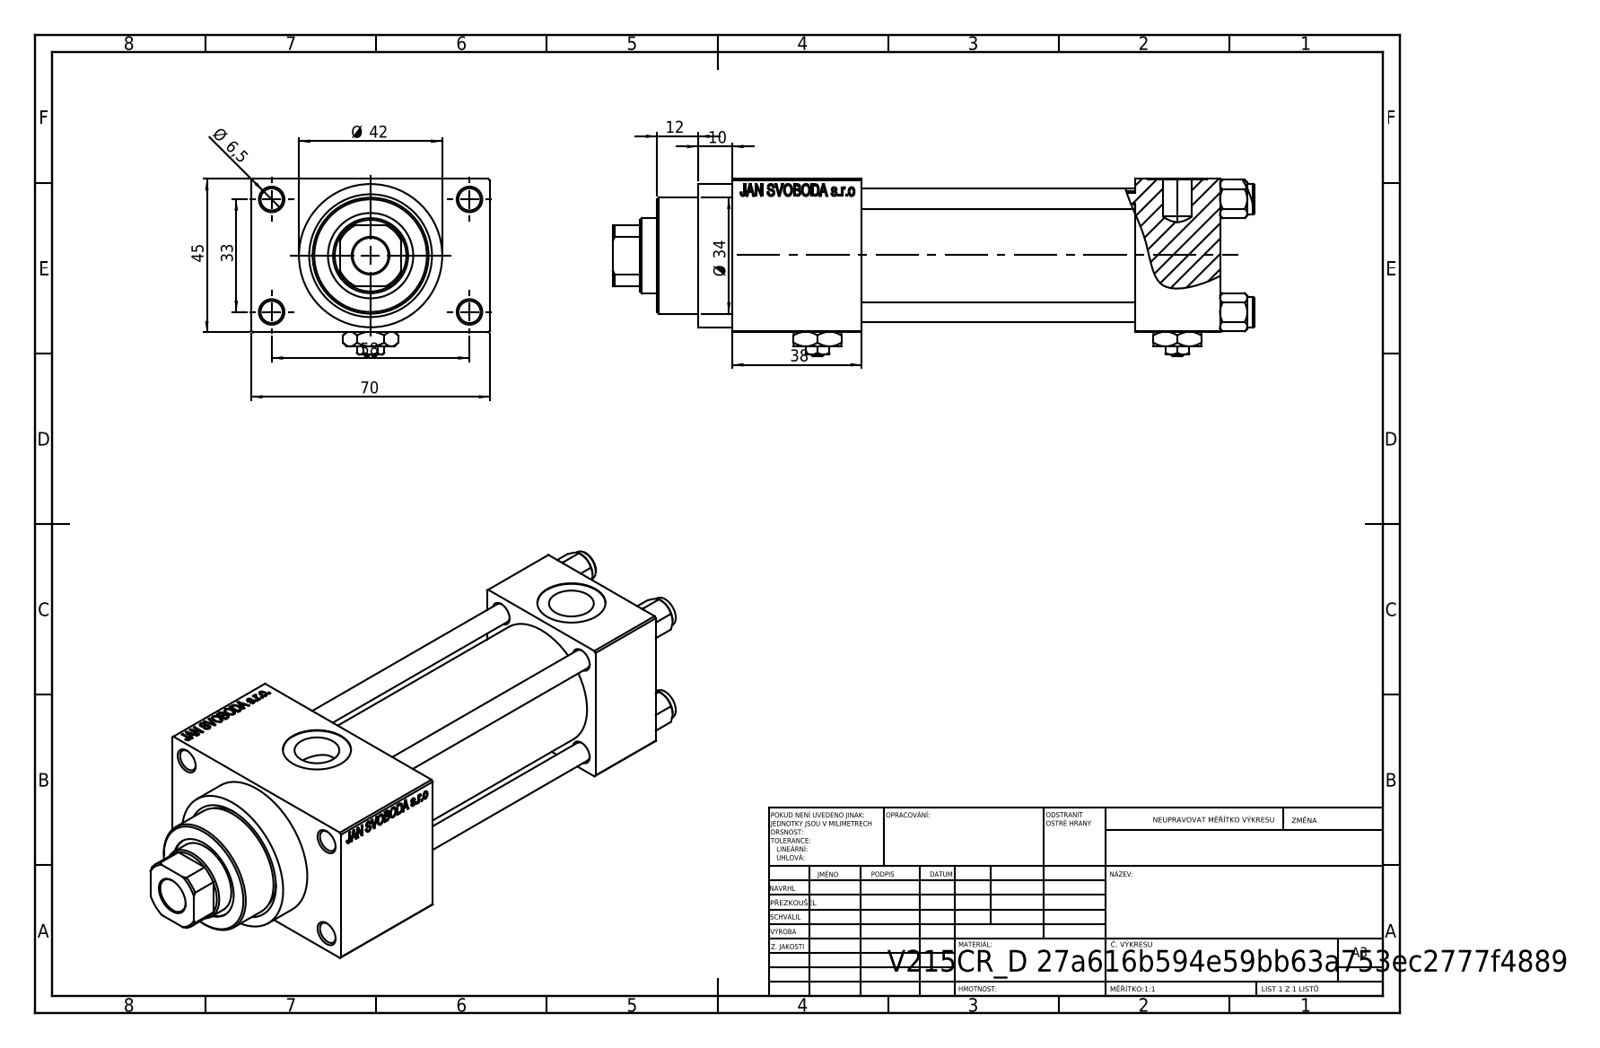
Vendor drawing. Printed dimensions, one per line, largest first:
70
58
45
Ø 42
38
Ø 34
33
12
10
Ø 6,5
